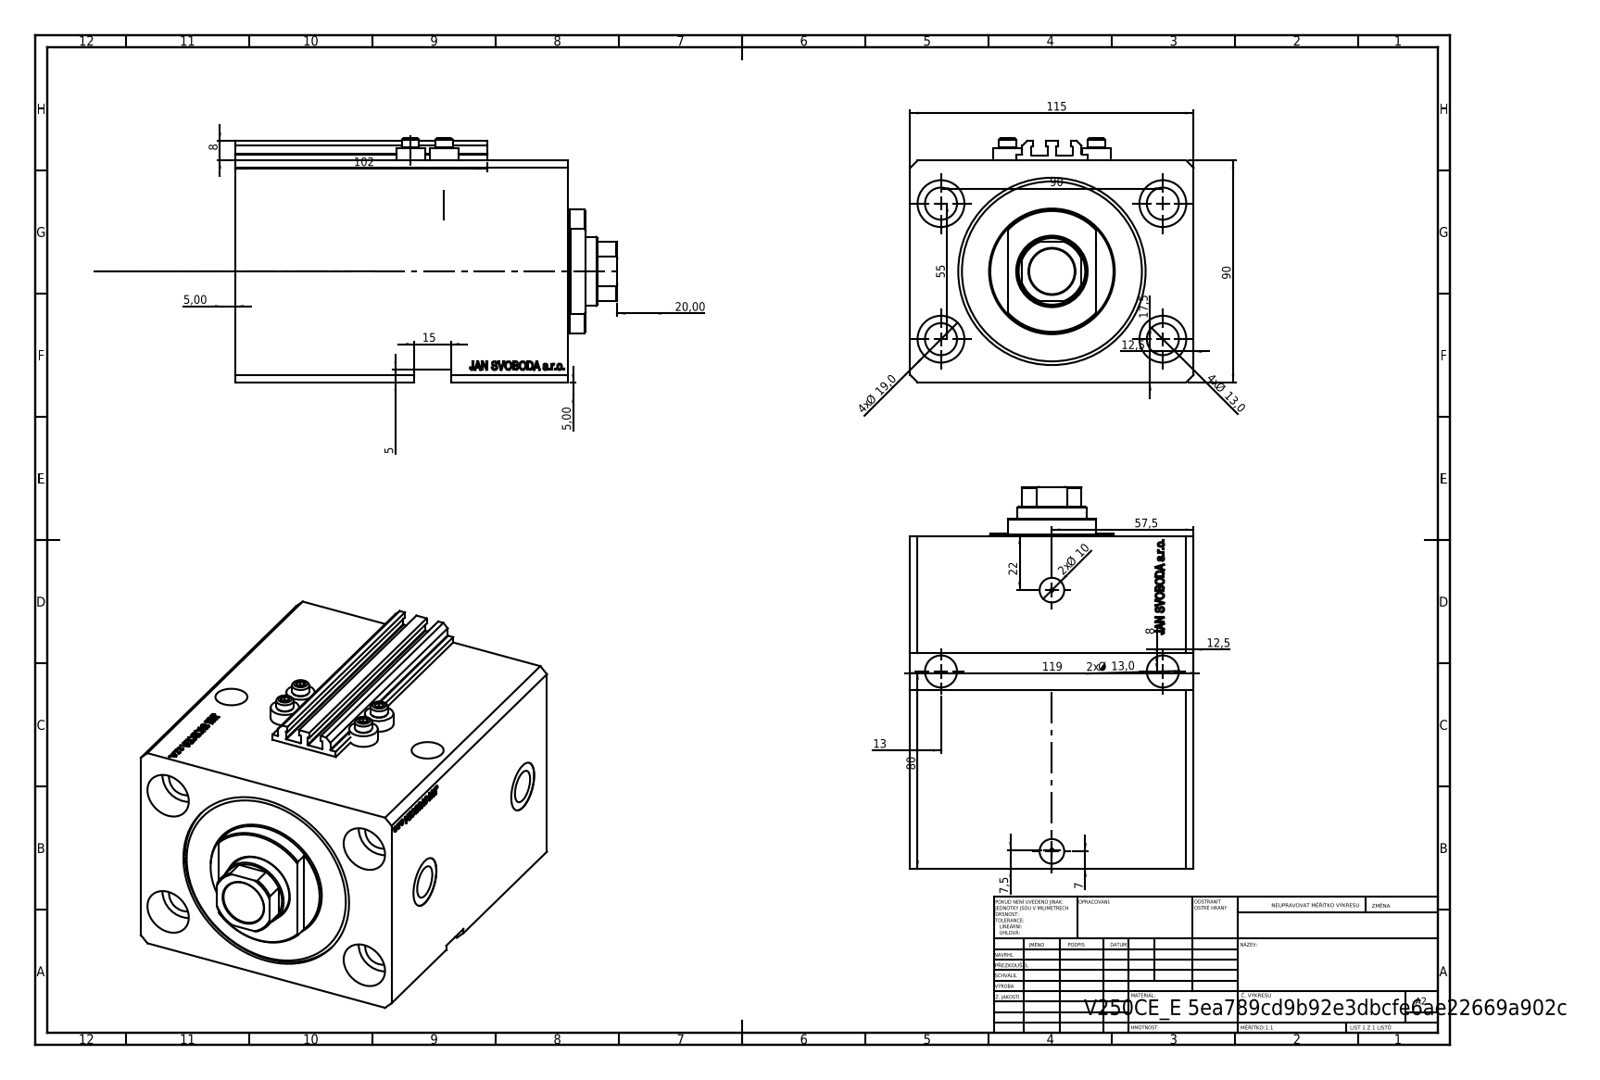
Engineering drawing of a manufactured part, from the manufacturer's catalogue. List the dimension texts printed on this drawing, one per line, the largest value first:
119
115
102
90
90
80
57,5
55
22
20,00
4x Ø 19,0
17,5
15
4x Ø 13,0
2x Ø 13,0
13
12,5
12,5
2x Ø 10
8
8
7,5
7
5,00
5,00
5
